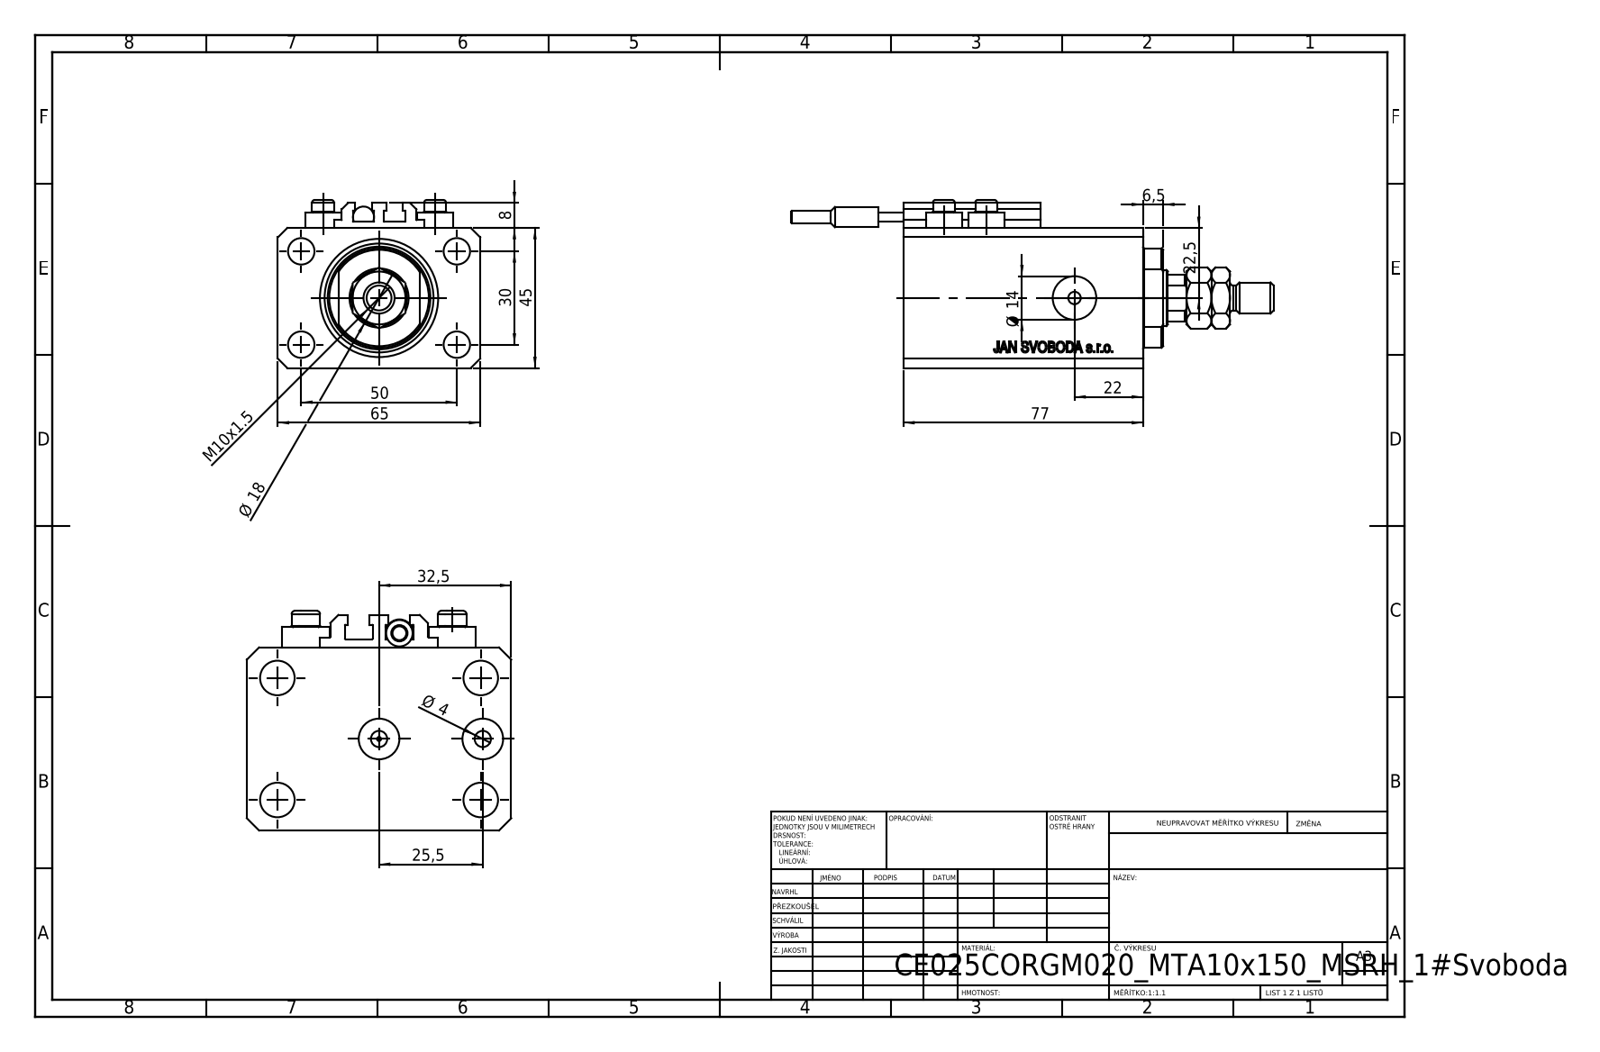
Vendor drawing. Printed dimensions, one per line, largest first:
77
65
50
45
32,5
30
25,5
22,5
22
Ø 18
Ø 14
M10x1.5
8
6,5
Ø 4
